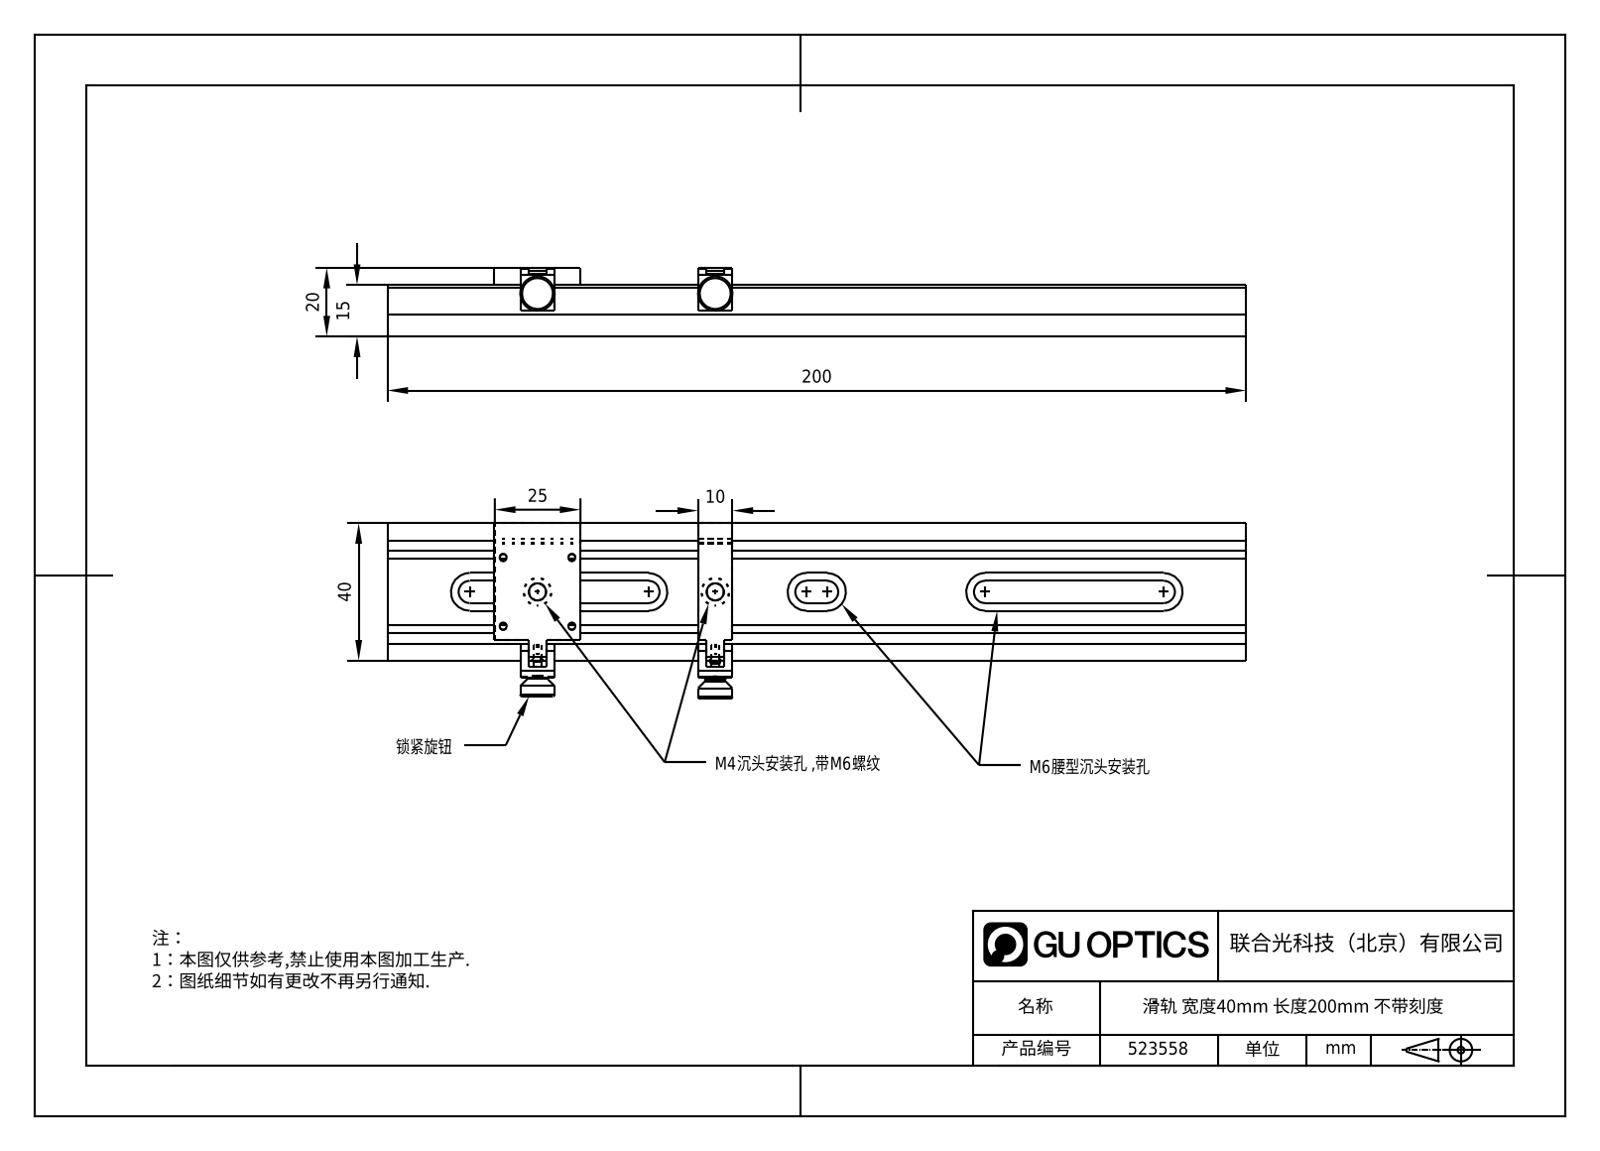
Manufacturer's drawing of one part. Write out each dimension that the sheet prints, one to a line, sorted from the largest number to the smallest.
200
40
25
20
15
10
